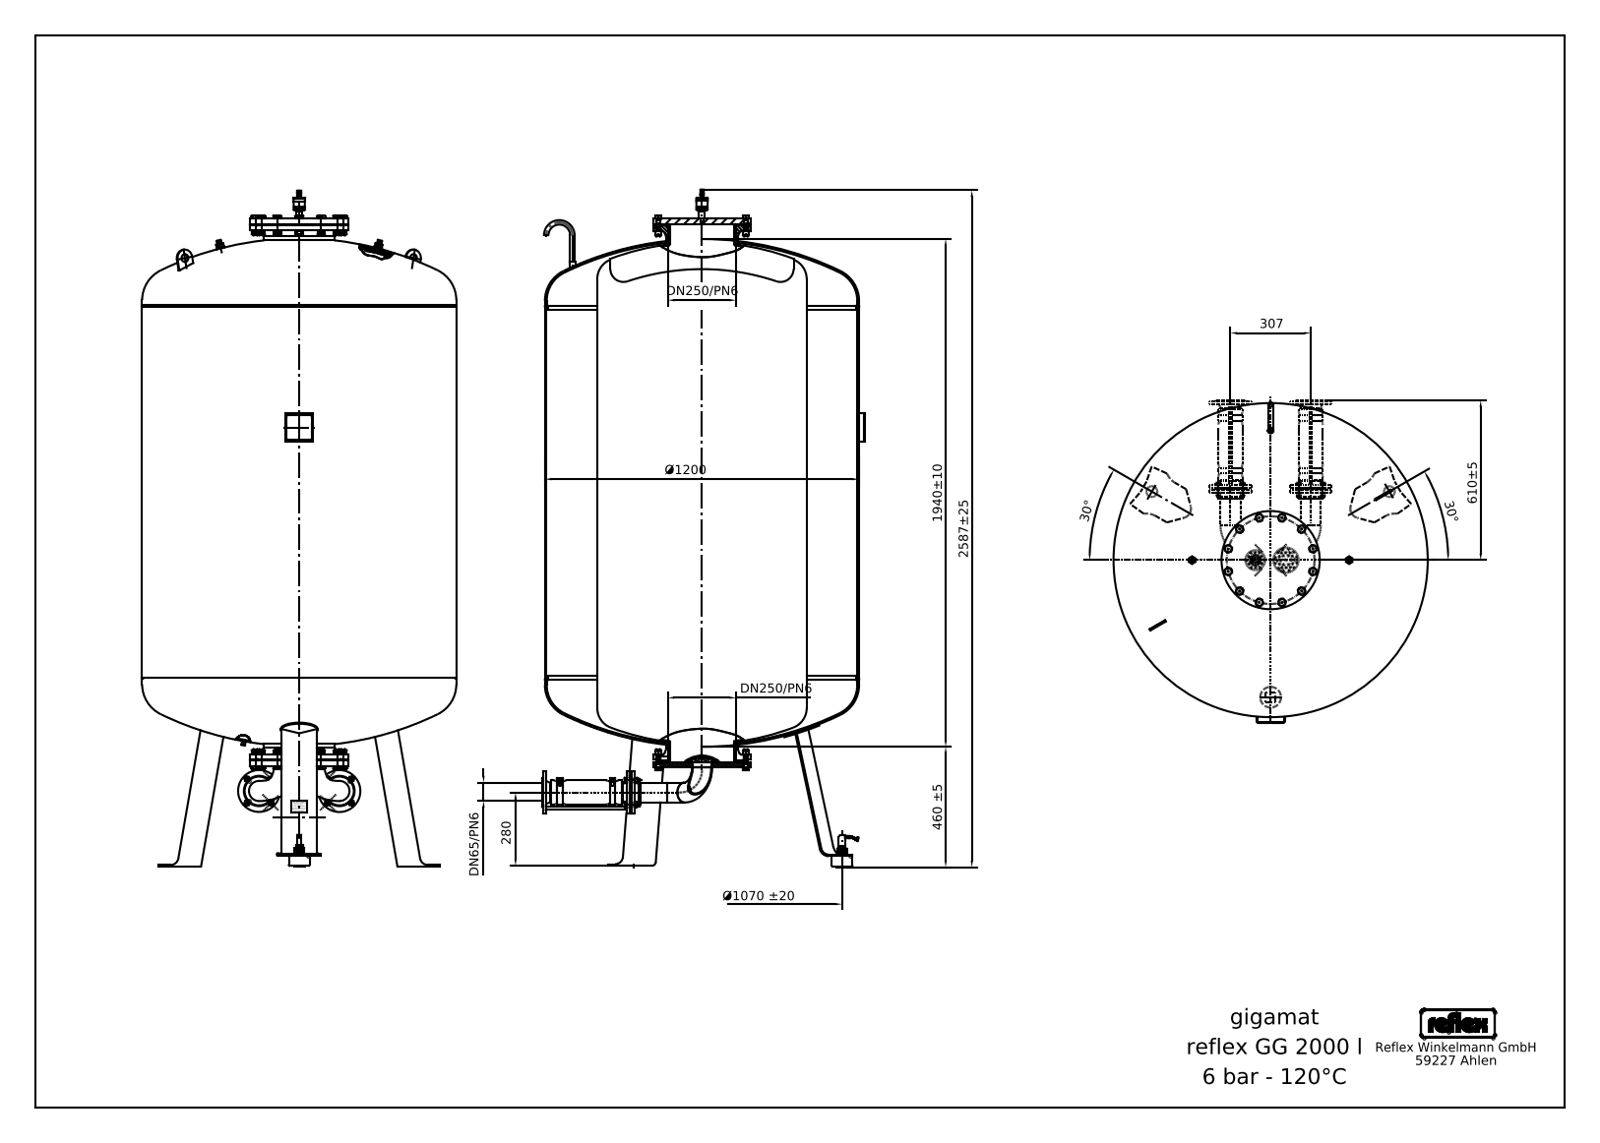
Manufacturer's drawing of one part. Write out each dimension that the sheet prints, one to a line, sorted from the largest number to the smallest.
2587±25
1940±10
Ø1200
Ø1070 ±20
610±5
460 ±5
307
280
DN250/PN6
DN250/PN6
DN65/PN6
30°
30°
